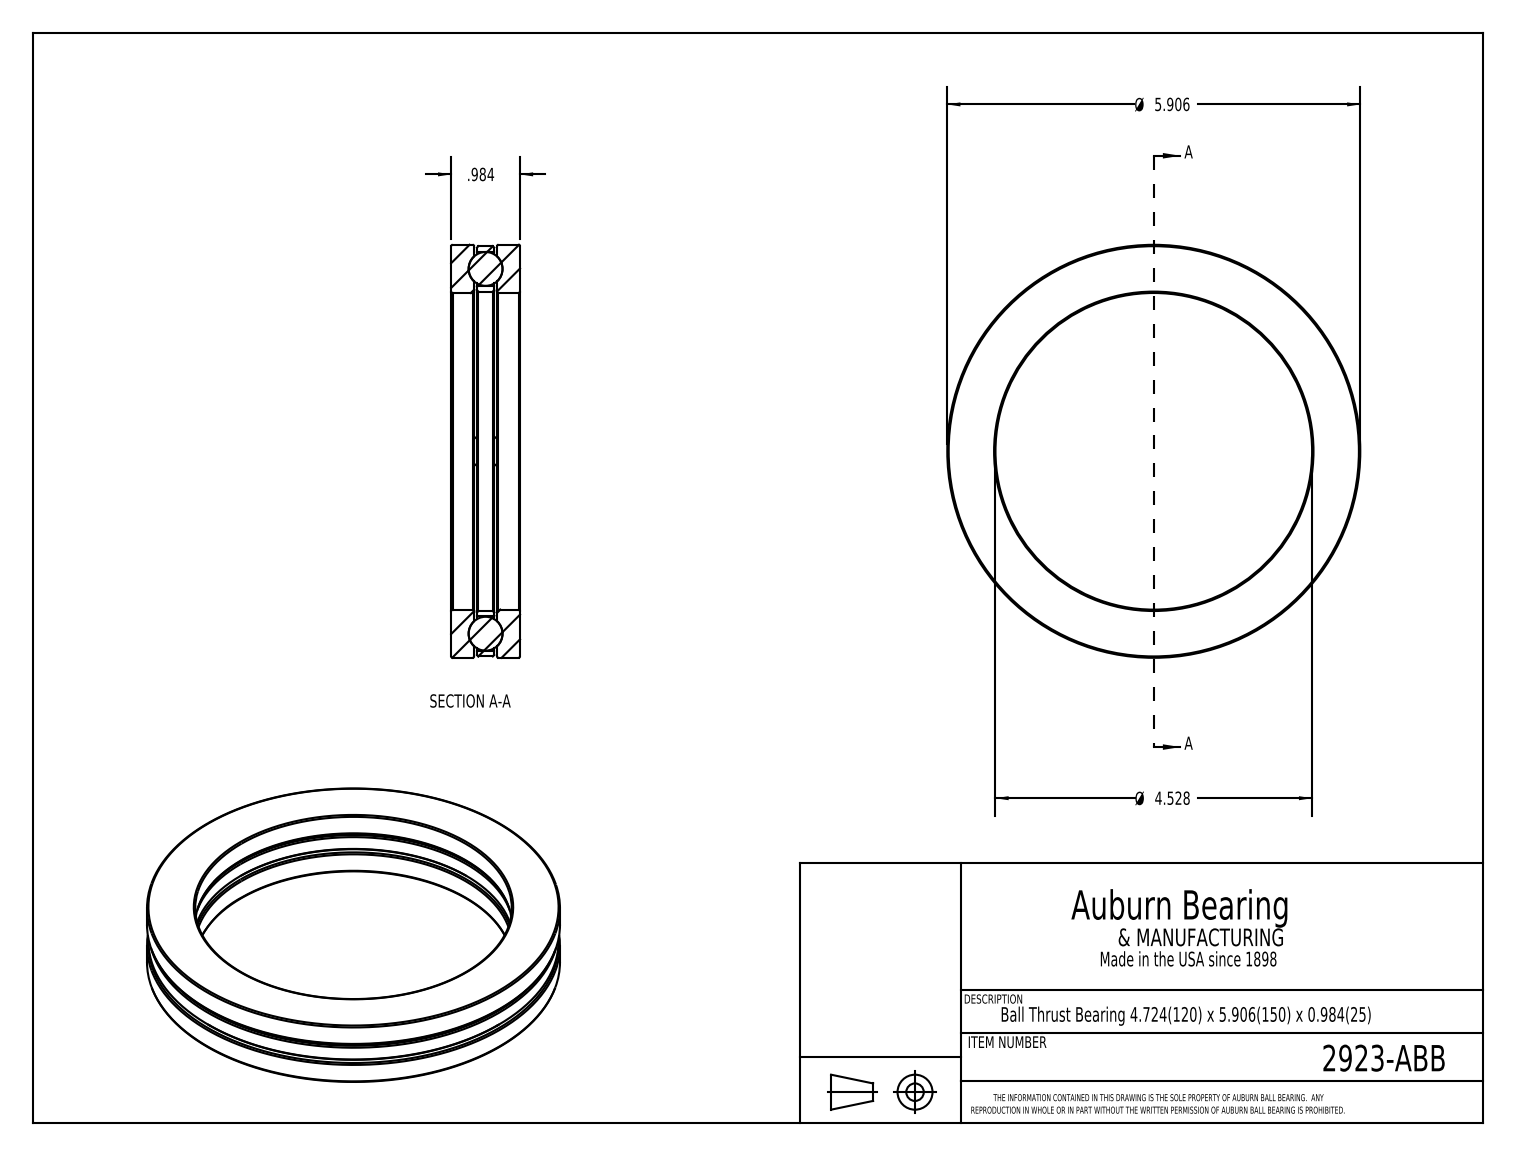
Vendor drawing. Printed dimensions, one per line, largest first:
Ø 5.906
Ø 4.528
.984
